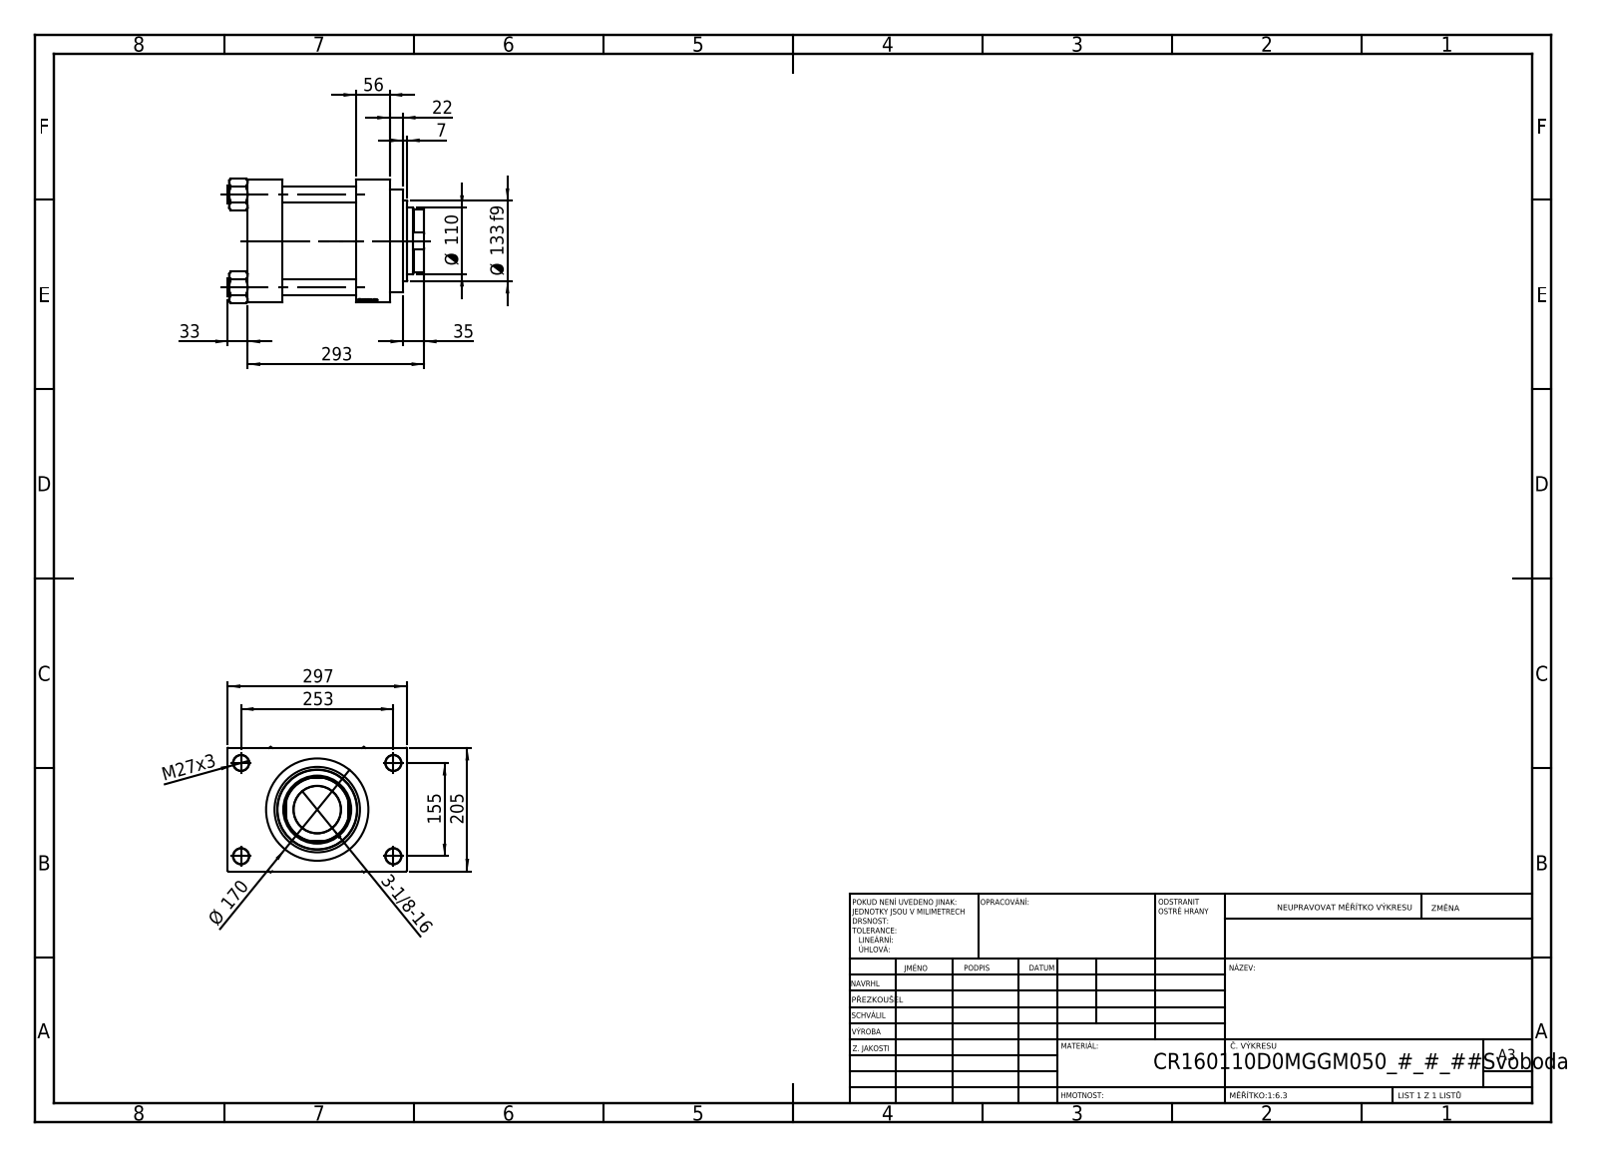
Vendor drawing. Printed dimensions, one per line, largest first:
297
293
253
205
Ø 170
155
Ø 133 f9
Ø 110
56
35
33
M27x3
22
7
3-1/8-16
